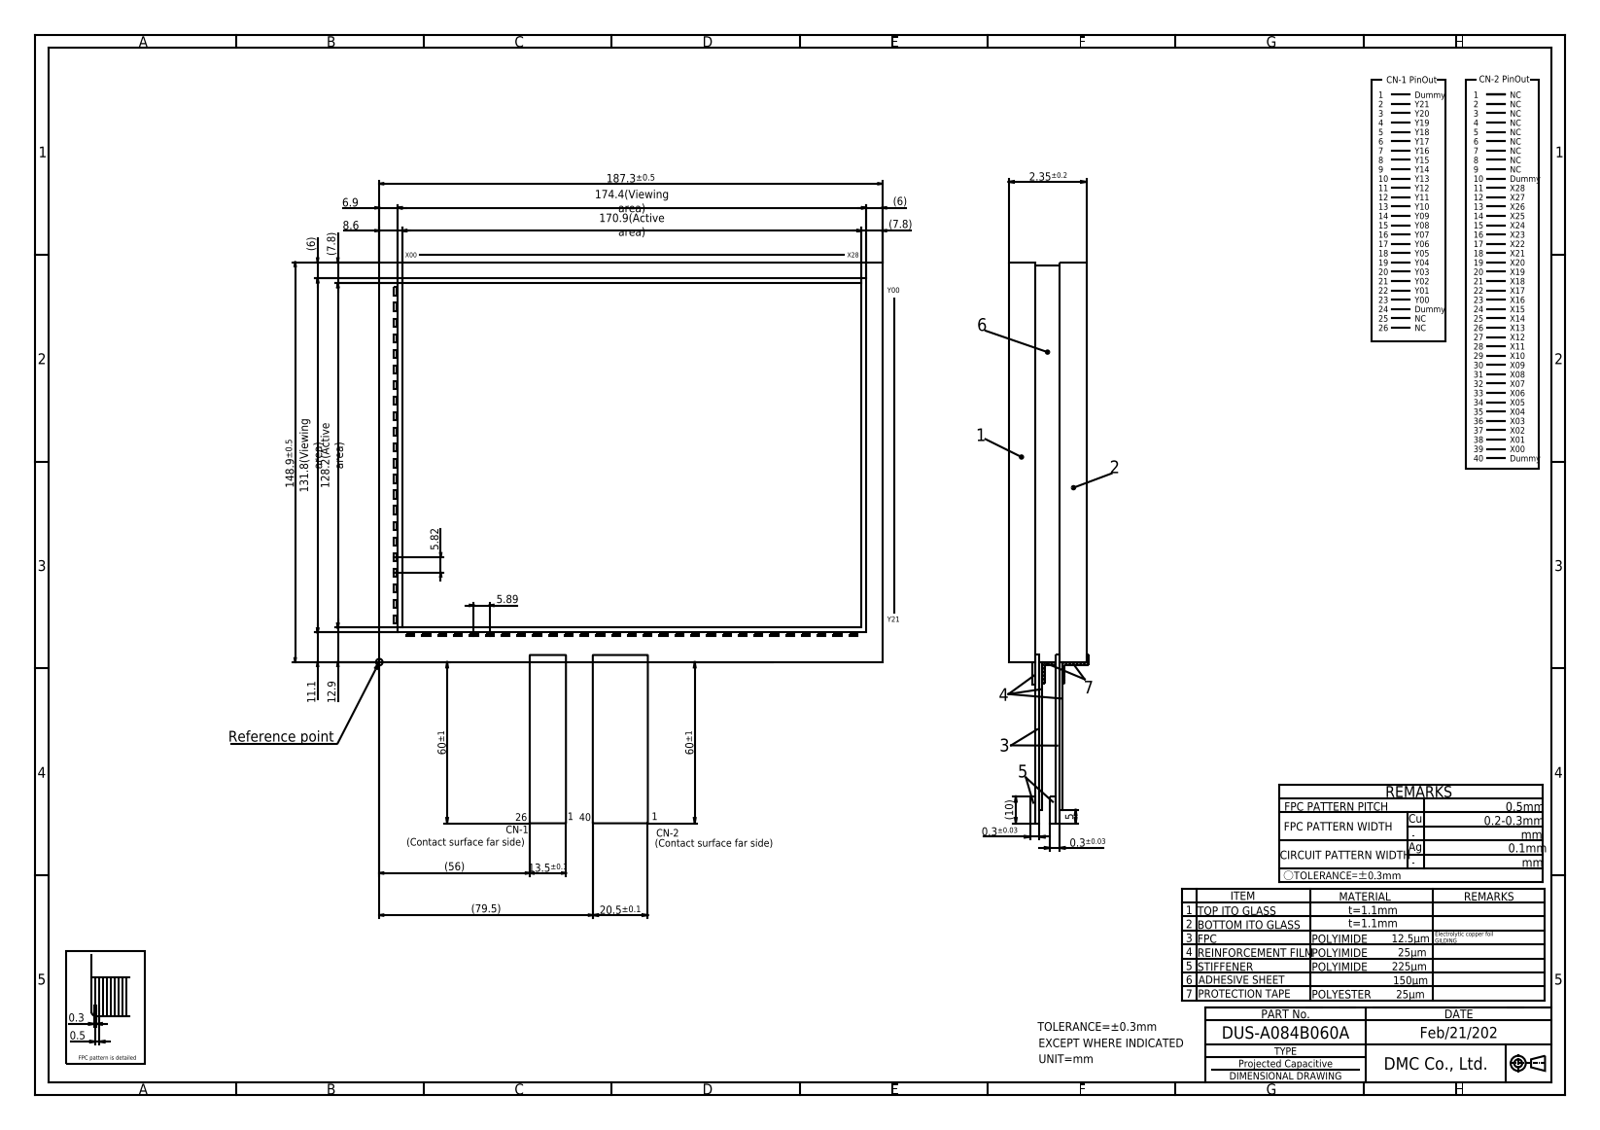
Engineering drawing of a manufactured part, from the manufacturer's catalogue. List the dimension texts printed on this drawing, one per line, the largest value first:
187.3±0.5
174.4(Viewing area)
170.9(Active area)
148.9±0.5
131.8(Viewing area)
128.2(Active area)
(79.5)
60±1
60±1
(56)
20.5±0.1
13.5±0.1
12.9
11.1
(10)
8.6
(7.8)
(7.8)
6.9
(6)
(6)
5.89
5.82
5
2.35±0.2
0.5
0.3
0.3±0.03
0.3±0.03
